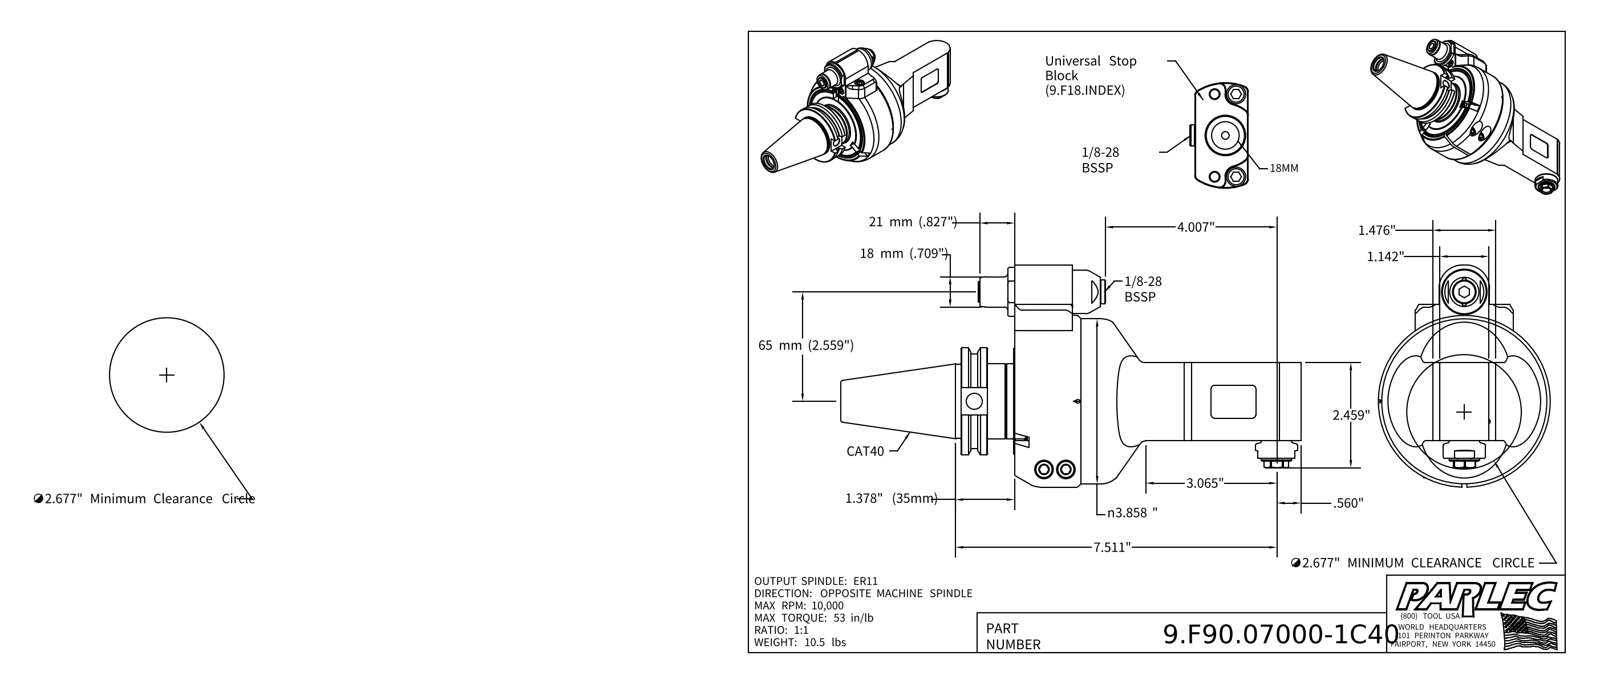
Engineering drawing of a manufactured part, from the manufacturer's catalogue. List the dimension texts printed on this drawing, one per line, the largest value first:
65 mm (2.559")
21 mm (.827")
18 mm (.709")
7.511"
4.007"
n3.858"
3.065"
∅2.677" Minimum Clearance Circle
∅2.677" MINIMUM CLEARANCE CIRCLE
2.459"
1.476"
1.378" (35mm)
1.142"
.560"
